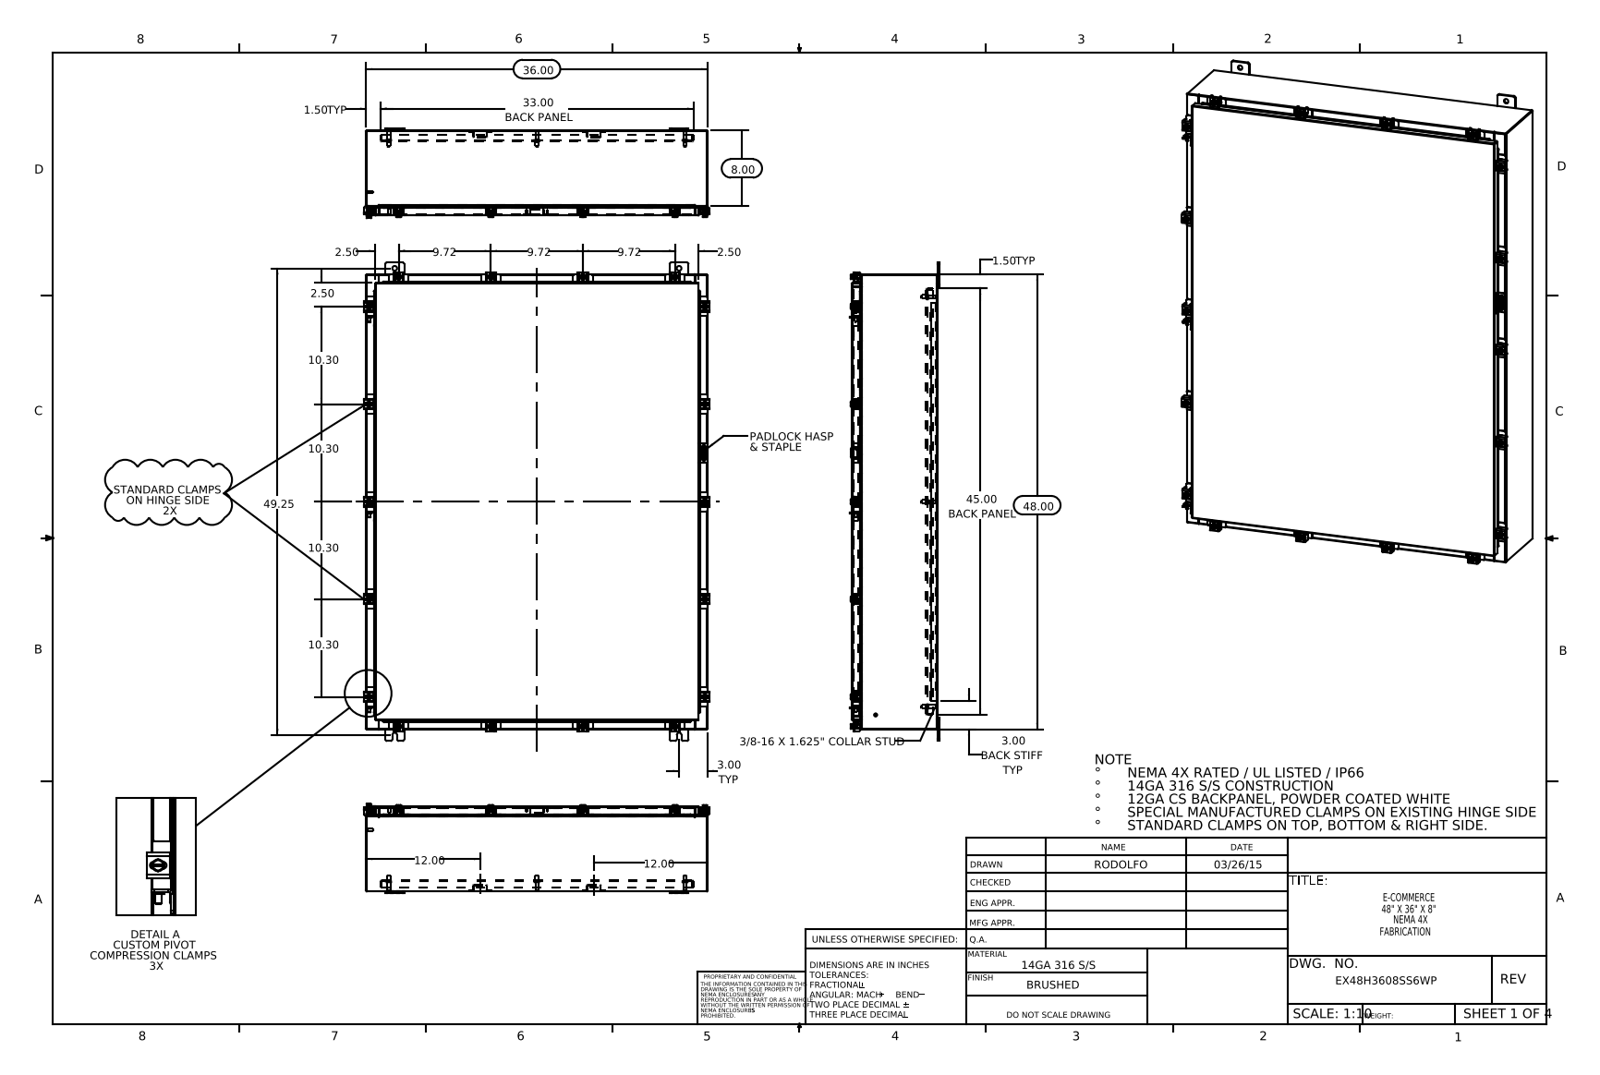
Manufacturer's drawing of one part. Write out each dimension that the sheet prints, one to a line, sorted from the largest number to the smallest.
49.25
48.00
45.00 BACK PANEL
36.00
33.00 BACK PANEL
12.00
12.00
10.30
10.30
10.30
10.30
9.72
9.72
9.72
8.00
3.00 TYP
3.00 BACK STIFF TYP
2.50
2.50
2.50
1.50 TYP
1.50 TYP
